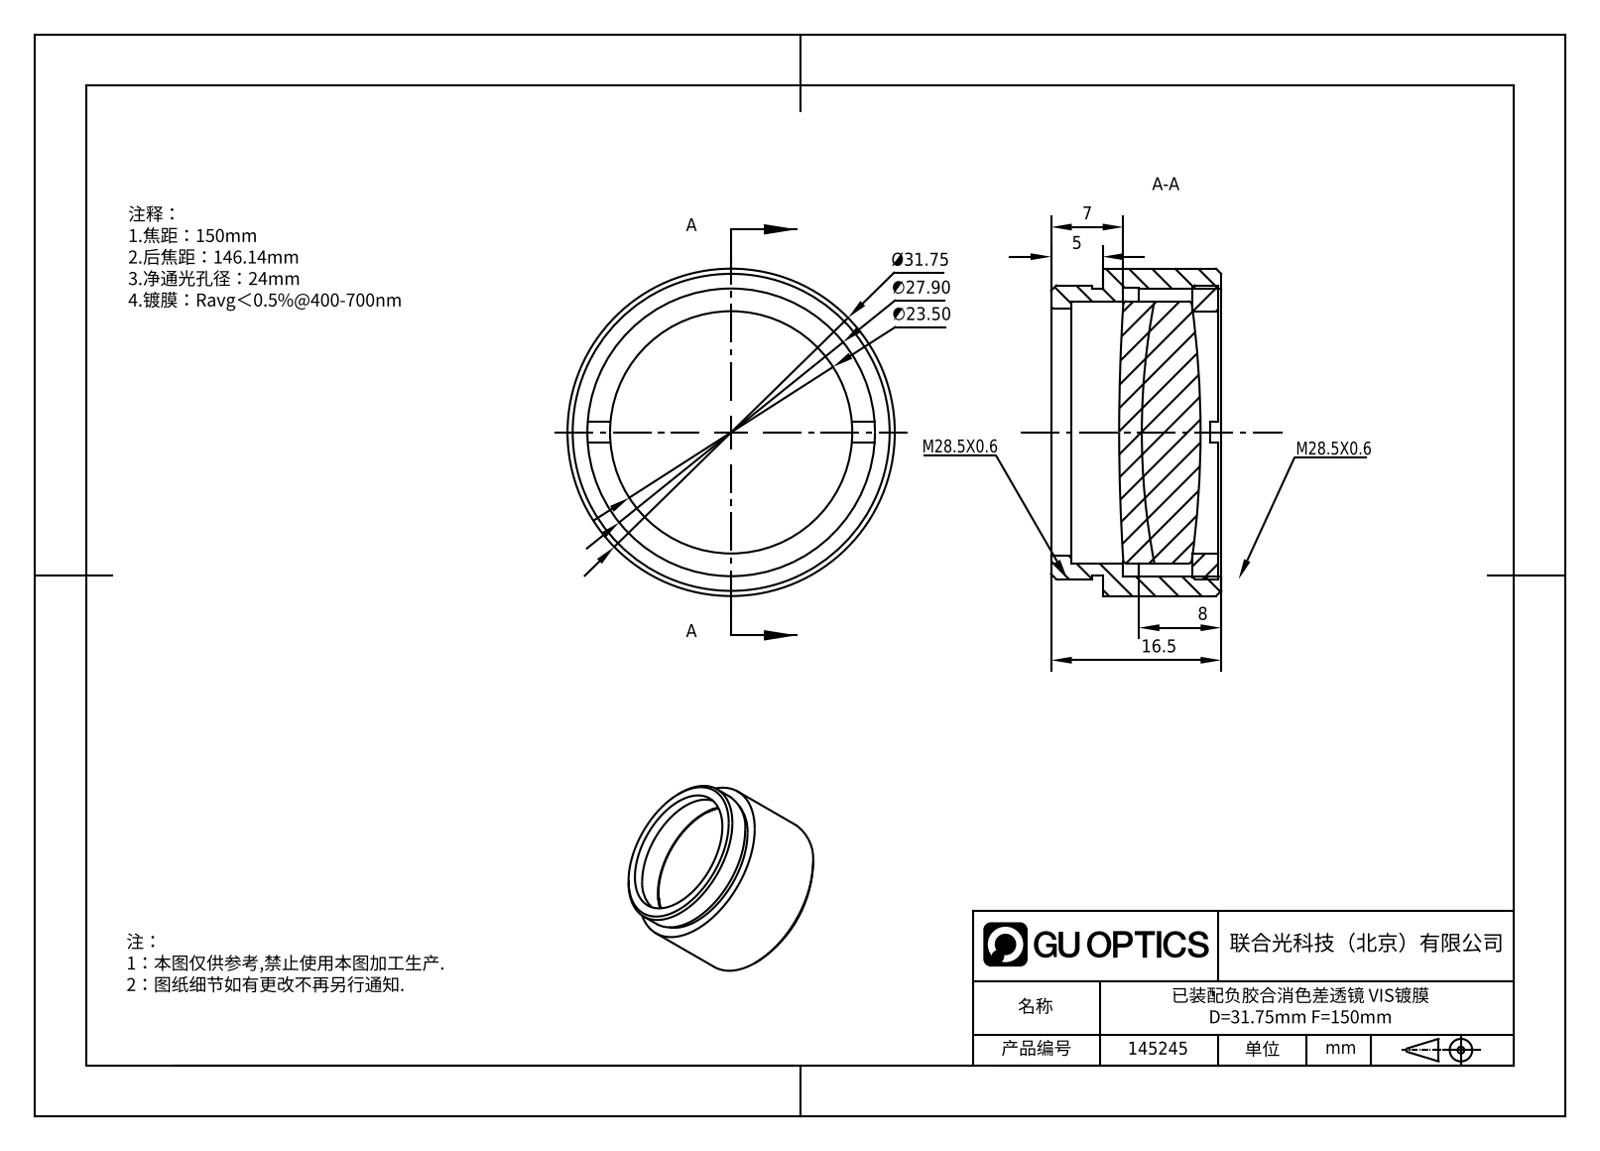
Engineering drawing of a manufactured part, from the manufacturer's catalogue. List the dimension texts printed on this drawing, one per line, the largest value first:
Ø31.75
∅27.90
∅23.50
16.5
8
7
5
